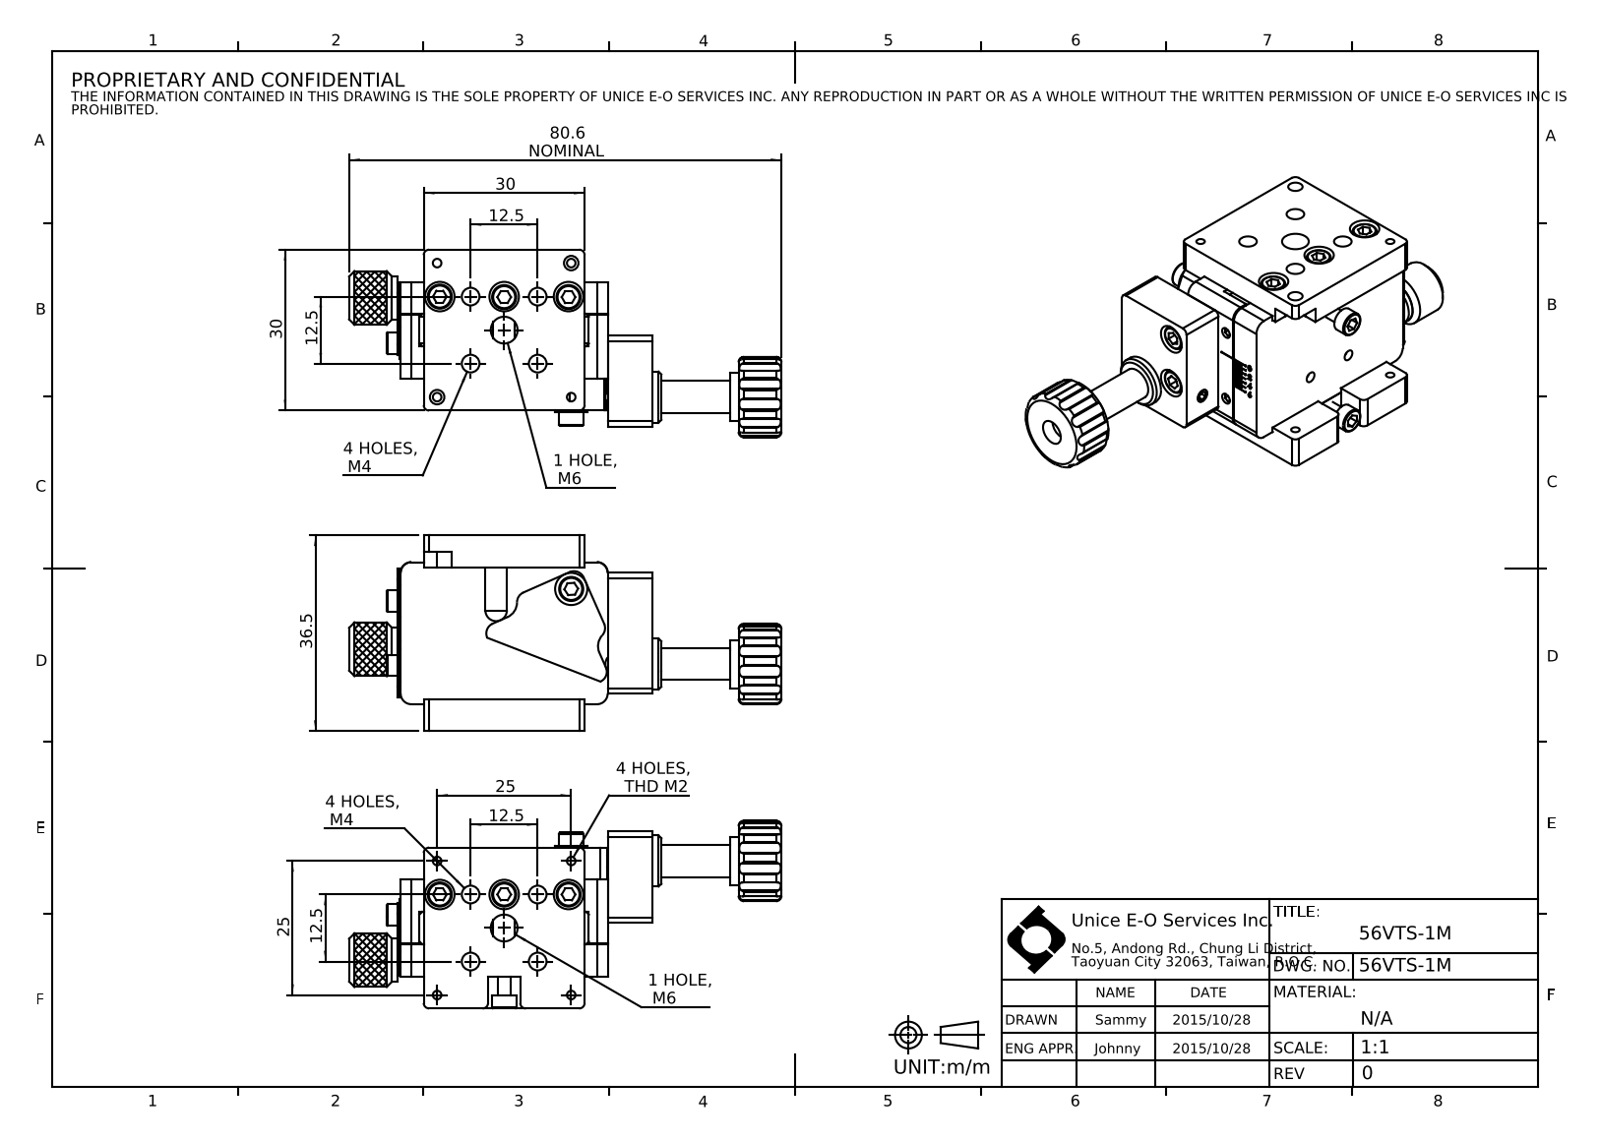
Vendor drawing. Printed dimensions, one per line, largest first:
80.6 NOMINAL
36.5
30
30
25
25
12.5
12.5
12.5
12.5
4 HOLES, M4
4 HOLES, M4
4 HOLES, THD M2
1 HOLE, M6
1 HOLE, M6
